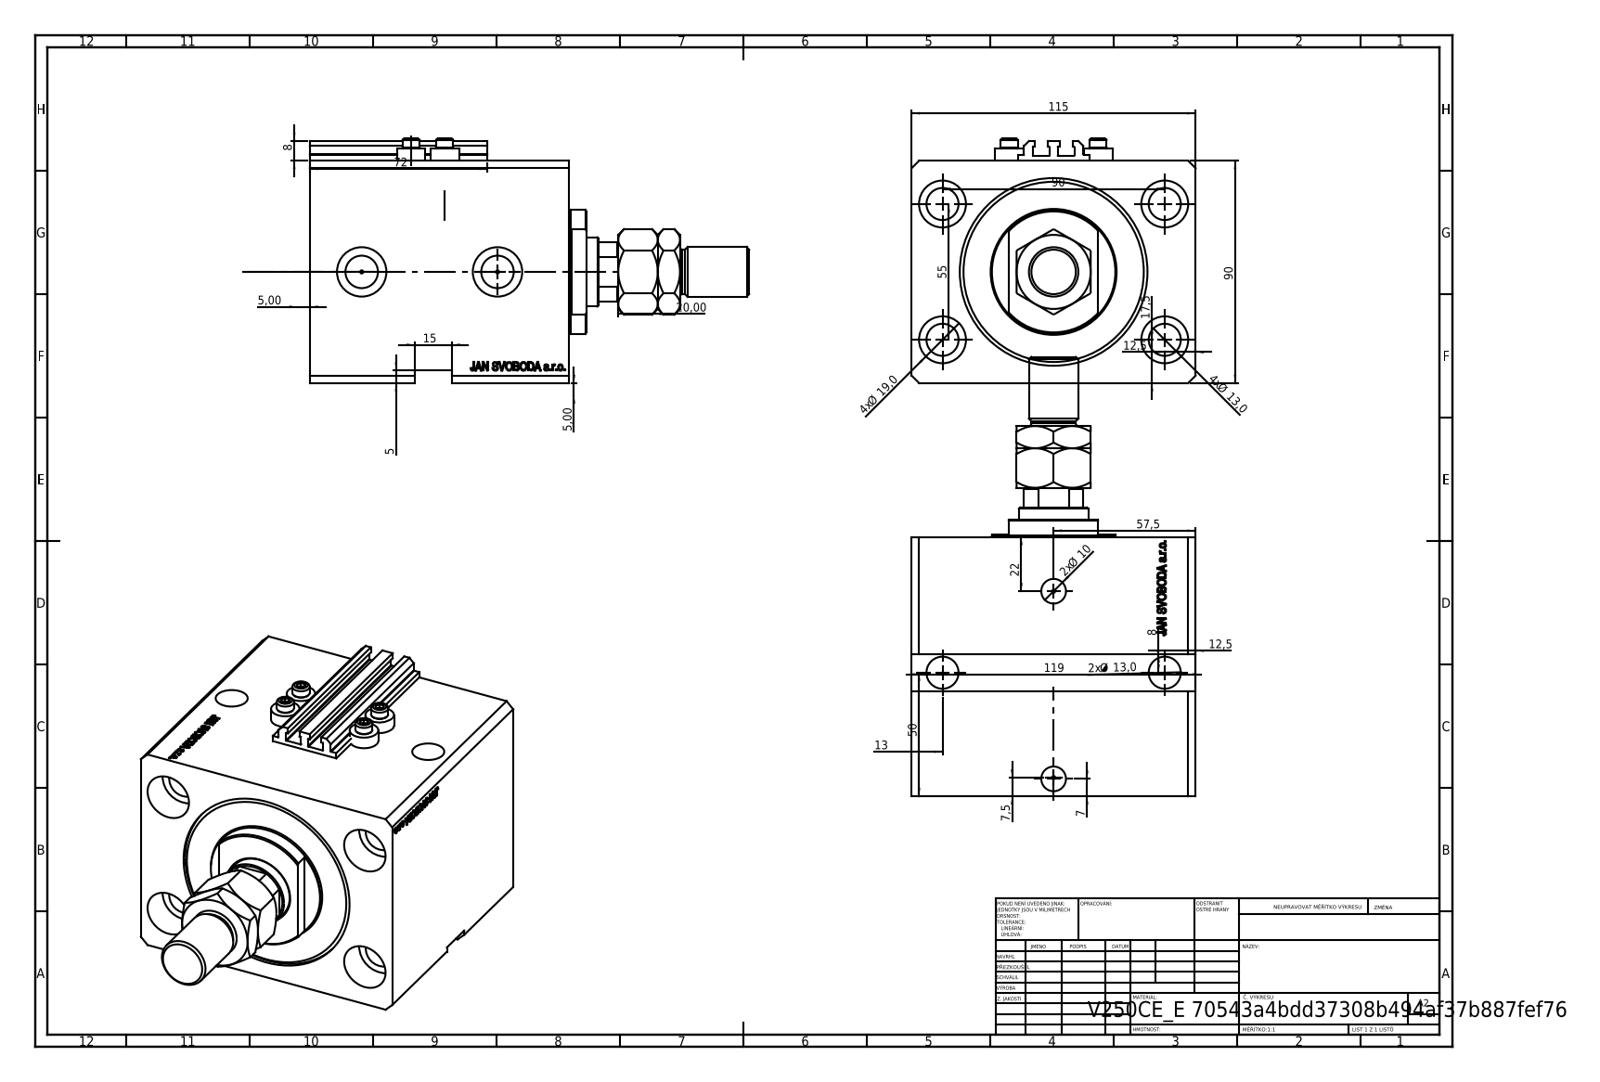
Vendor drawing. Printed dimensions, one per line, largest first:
119
115
90
90
72
57,5
55
50
22
20,00
4x Ø 19,0
17,5
15
4x Ø 13,0
2x Ø 13,0
13
12,5
12,5
2x Ø 10
8
8
7,5
7
5,00
5,00
5
